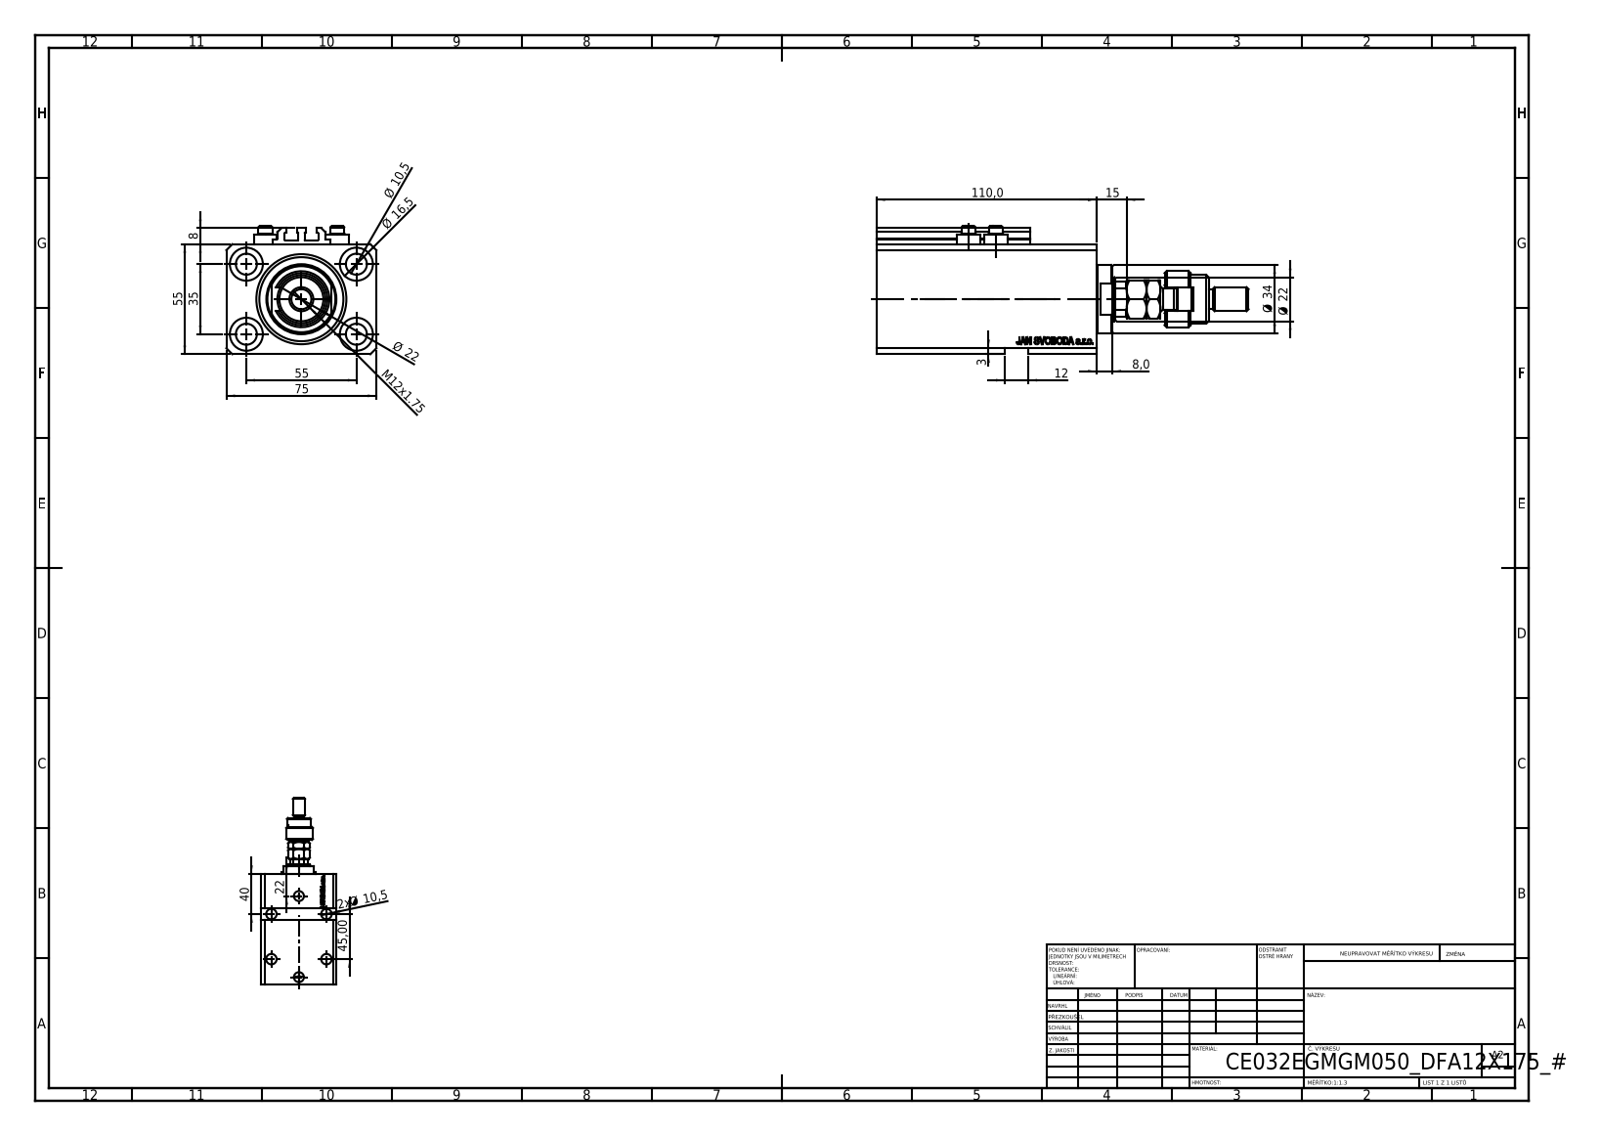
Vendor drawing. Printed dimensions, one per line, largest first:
110,0
75
55
55
45,00
40
35
Ø 34
Ø 22
Ø 22
22
Ø 16,5
15
M12x1.75
12
Ø 10,5
2x Ø 10,5
8
8,0
3
